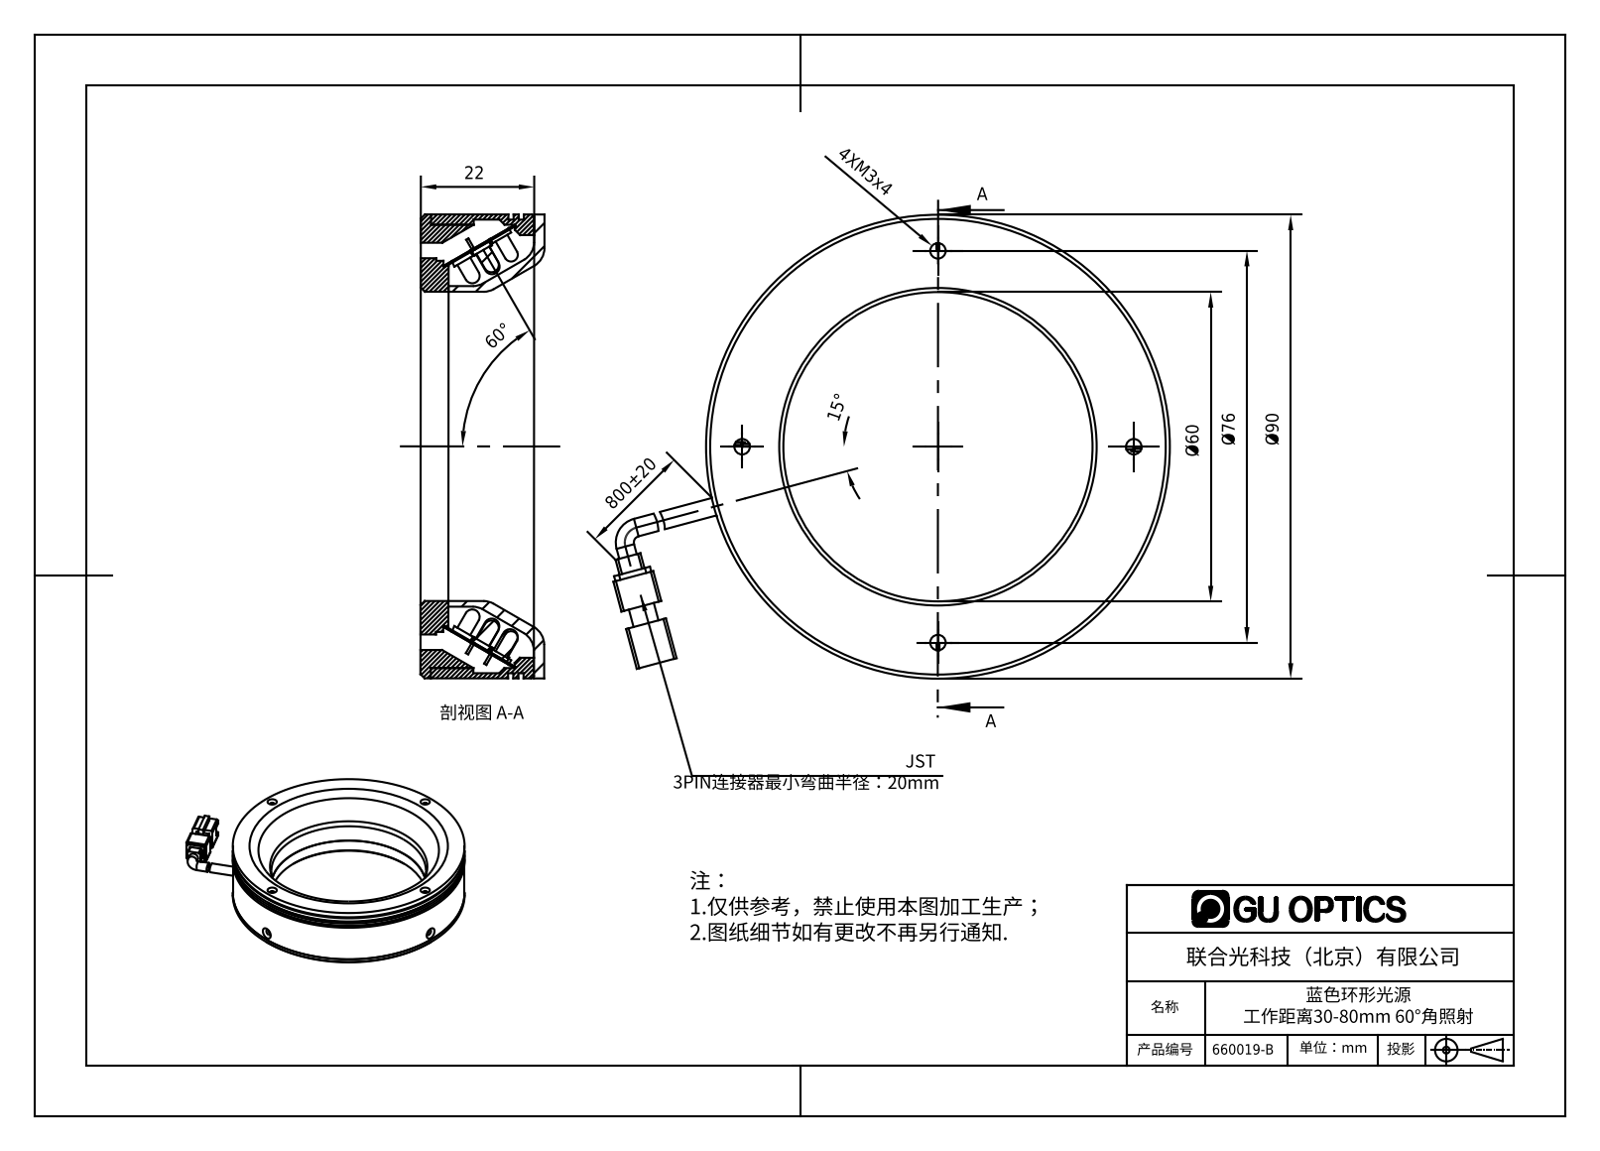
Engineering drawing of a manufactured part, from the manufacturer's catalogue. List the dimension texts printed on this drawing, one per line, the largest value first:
800±20
Ø90
Ø76
Ø60
60°
22
15°
4XM3x4
